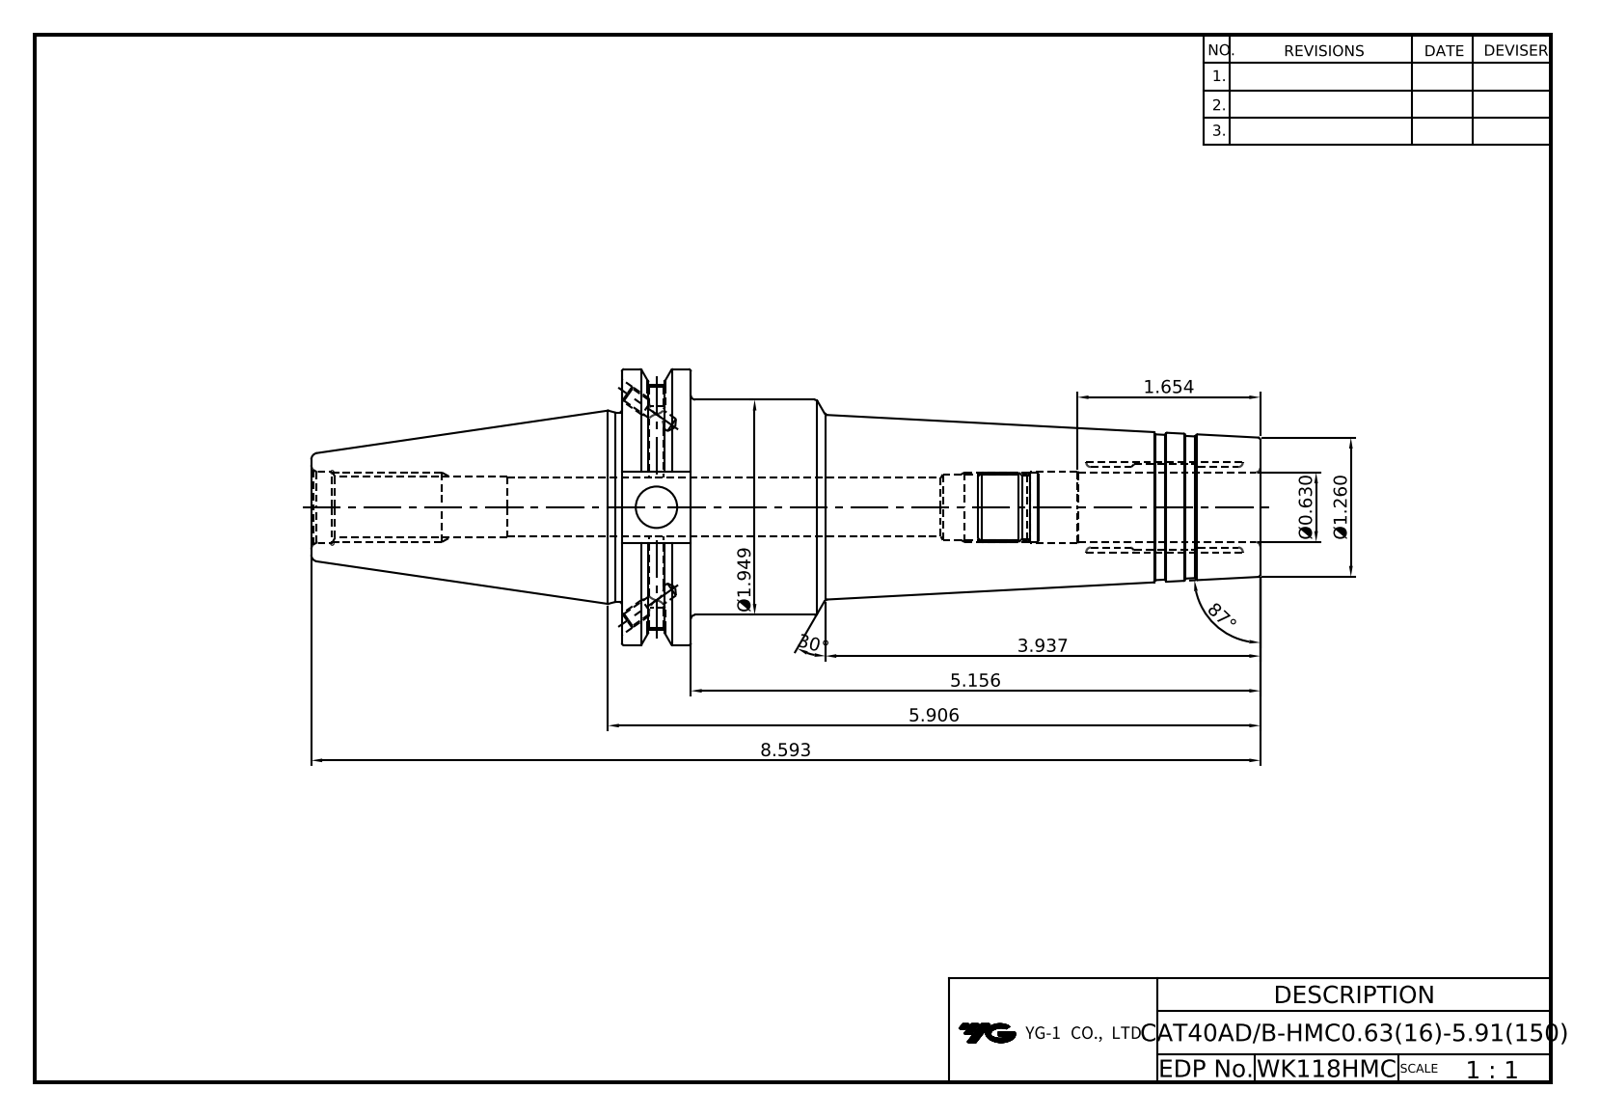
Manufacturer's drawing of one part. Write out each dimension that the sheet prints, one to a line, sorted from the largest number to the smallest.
87°
30°
8.593
5.906
5.156
3.937
Ø1.949
1.654
Ø1.260
Ø0.630
